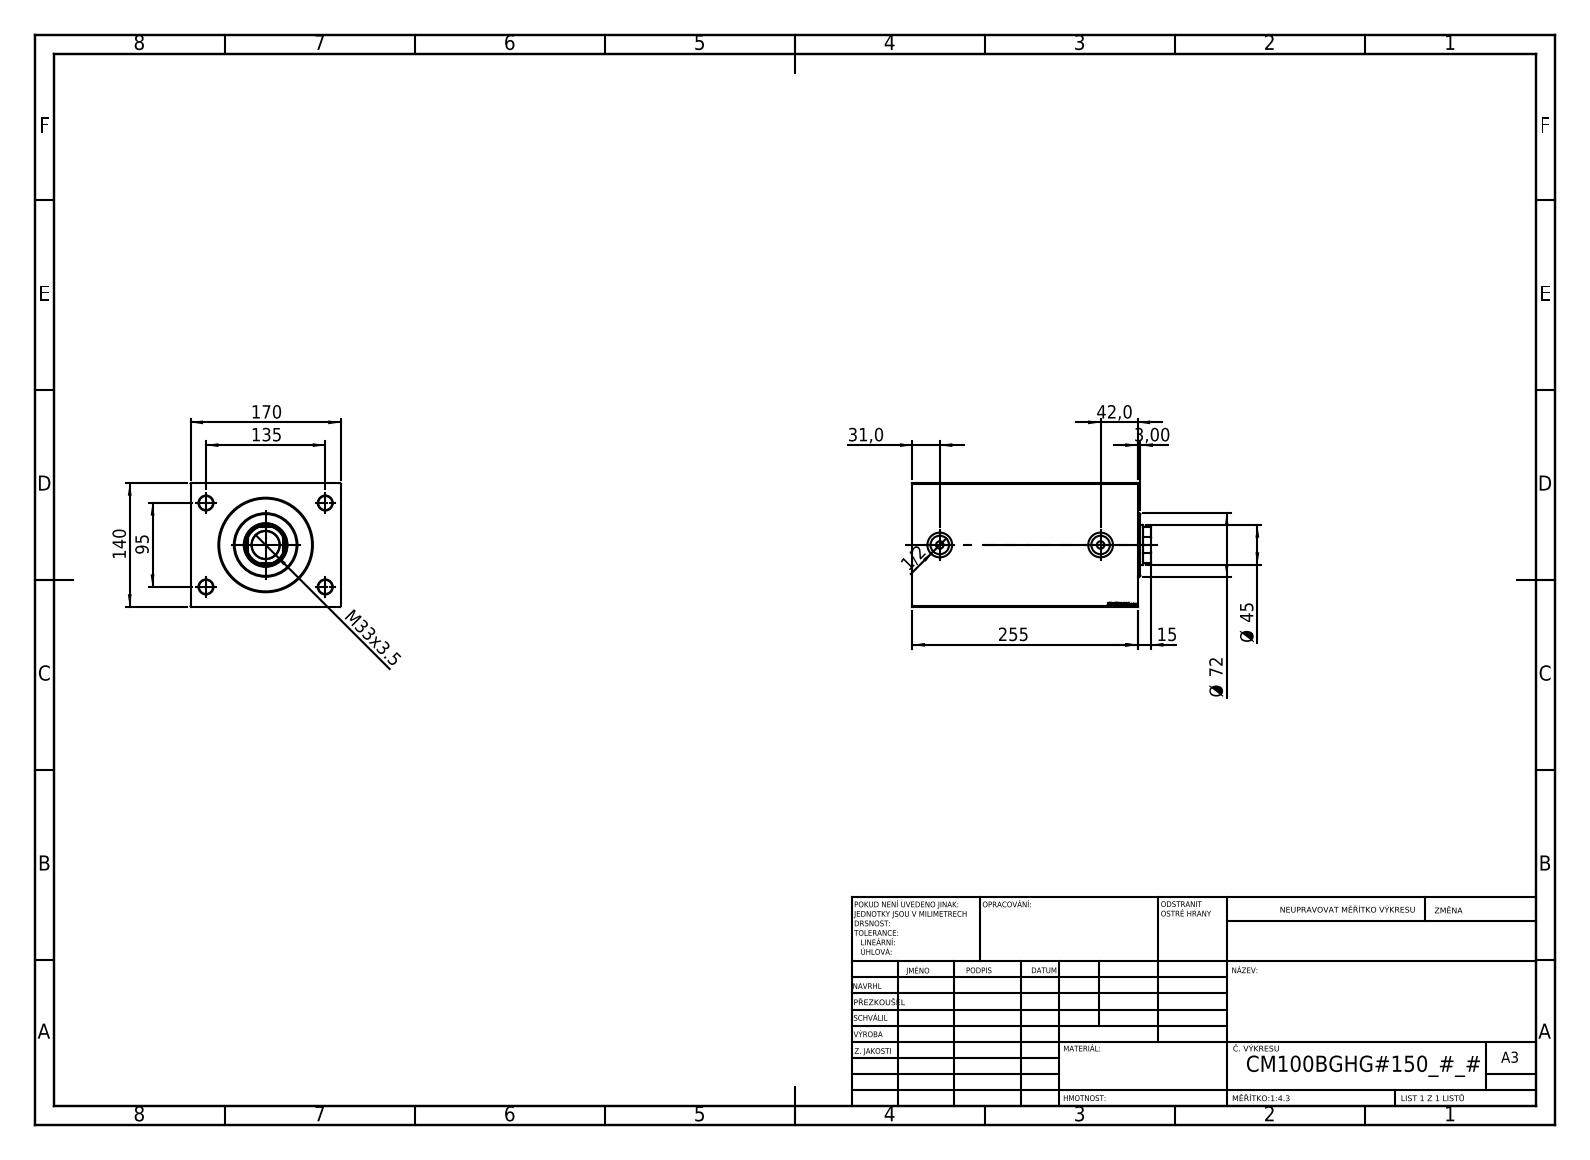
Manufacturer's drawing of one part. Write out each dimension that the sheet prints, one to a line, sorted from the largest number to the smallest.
255
170
140
135
95
Ø 72
Ø 45
42,0
M33x3.5
31,0
15
3,00
1/2
